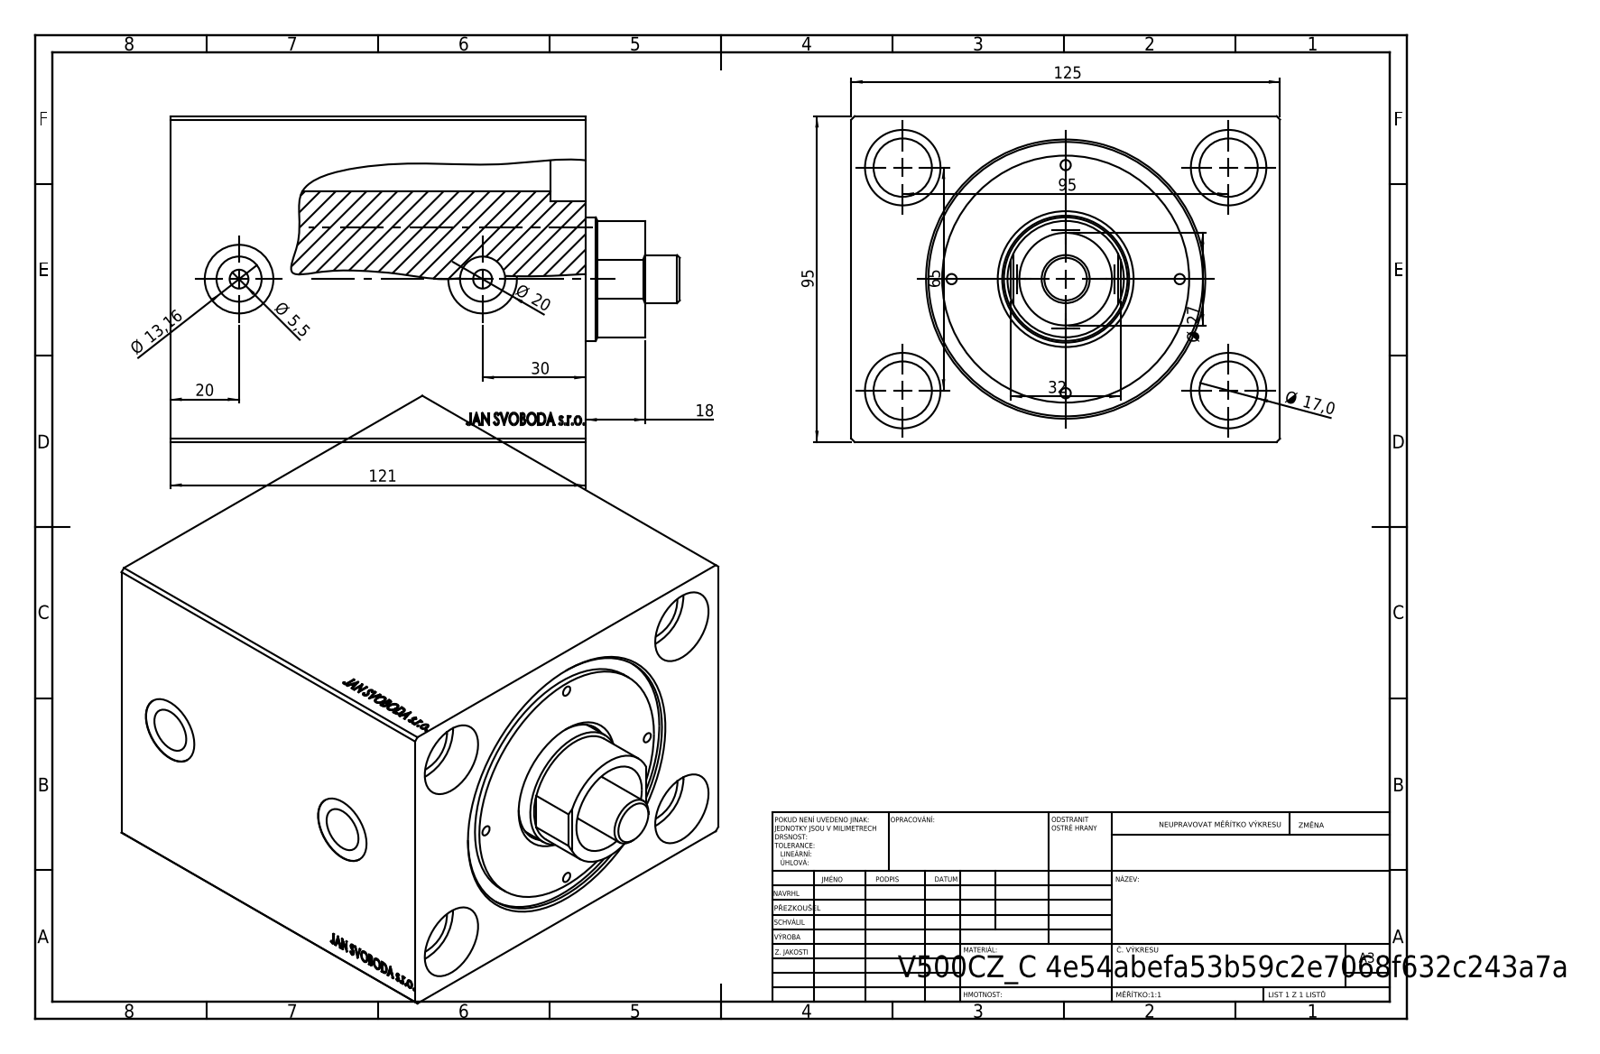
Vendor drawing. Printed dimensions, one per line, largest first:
125
121
95
95
65
32
30
Ø 27
Ø 20
20
18
Ø 17,0
Ø 13,16
Ø 5,5
